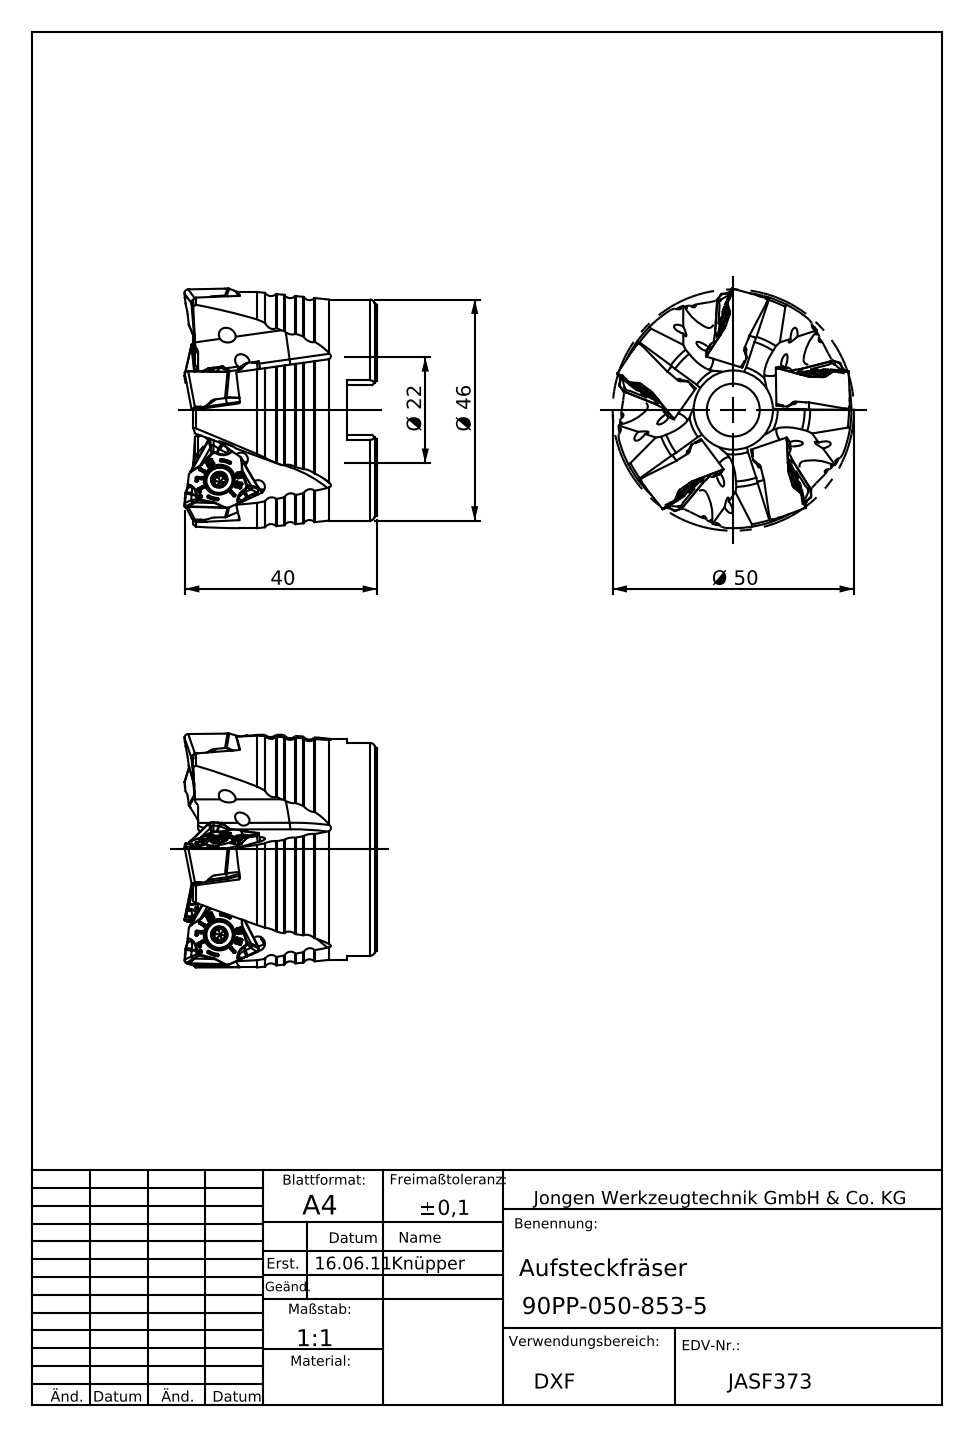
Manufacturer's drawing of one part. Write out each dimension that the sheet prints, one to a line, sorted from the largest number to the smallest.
Ø 50
Ø 46
40
Ø 22
